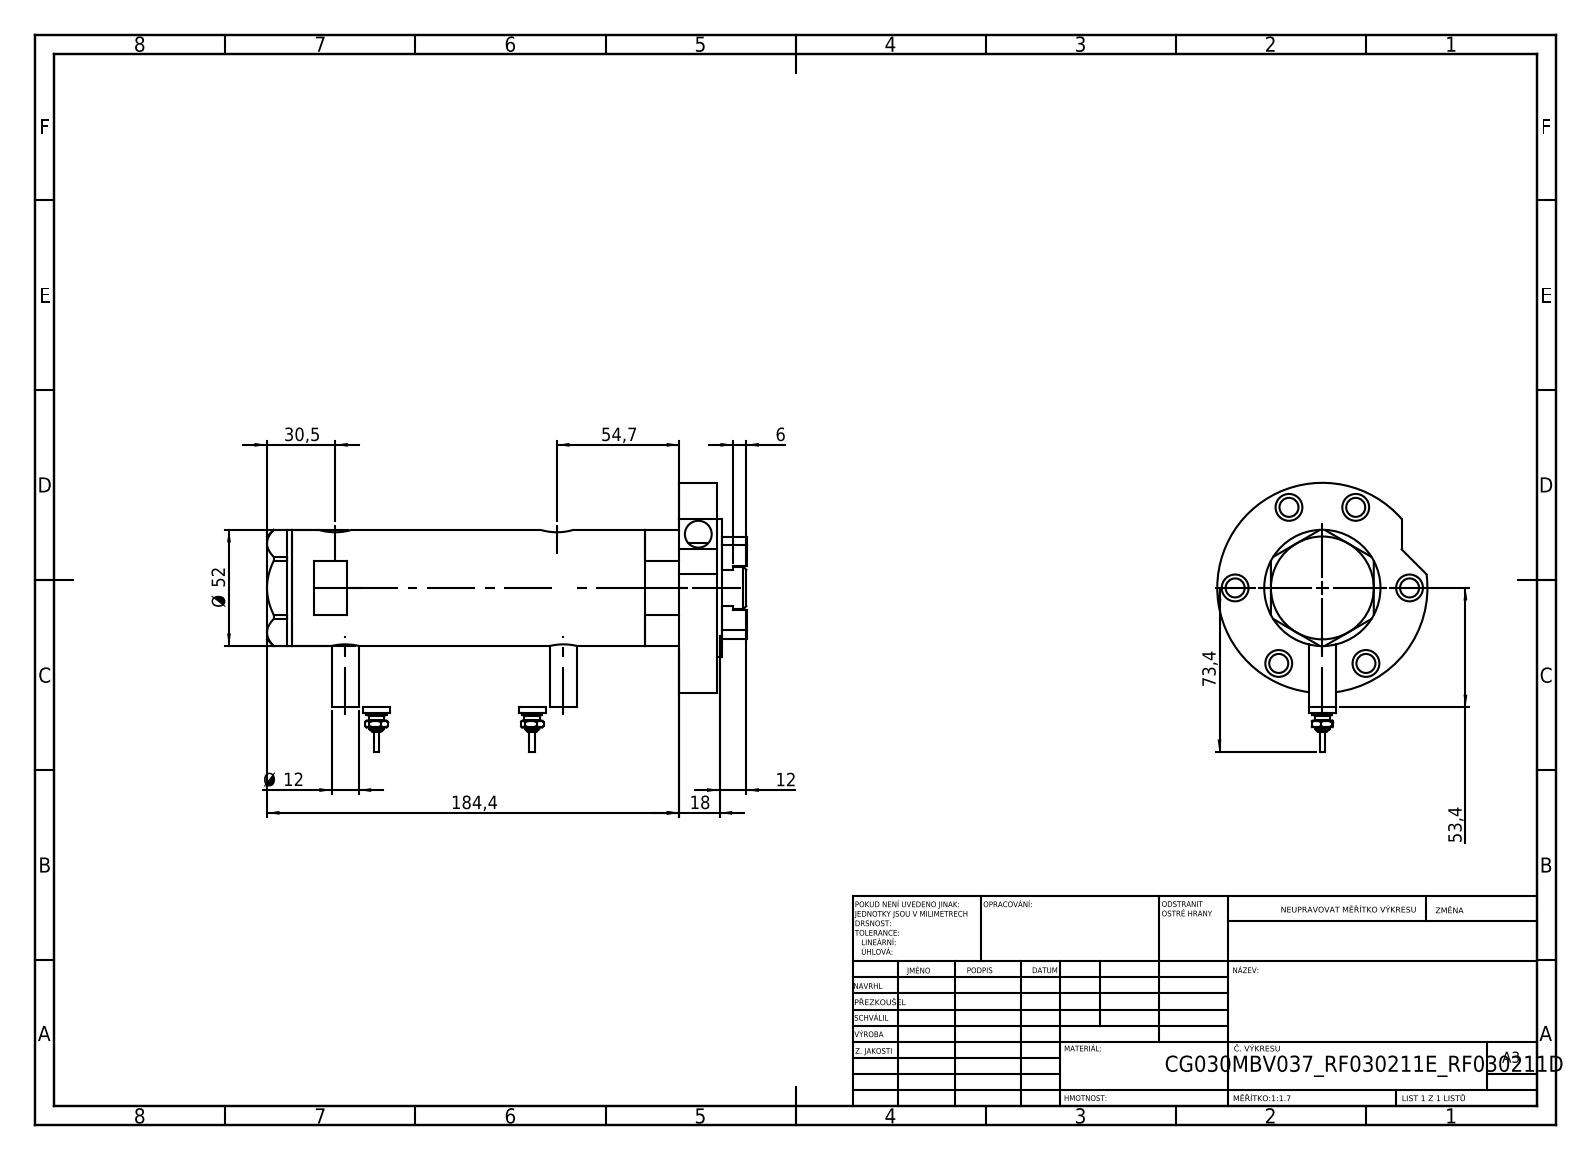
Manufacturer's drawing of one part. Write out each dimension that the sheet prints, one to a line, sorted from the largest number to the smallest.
184,4
73,4
54,7
53,4
Ø 52
30,5
18
12
Ø 12
6
